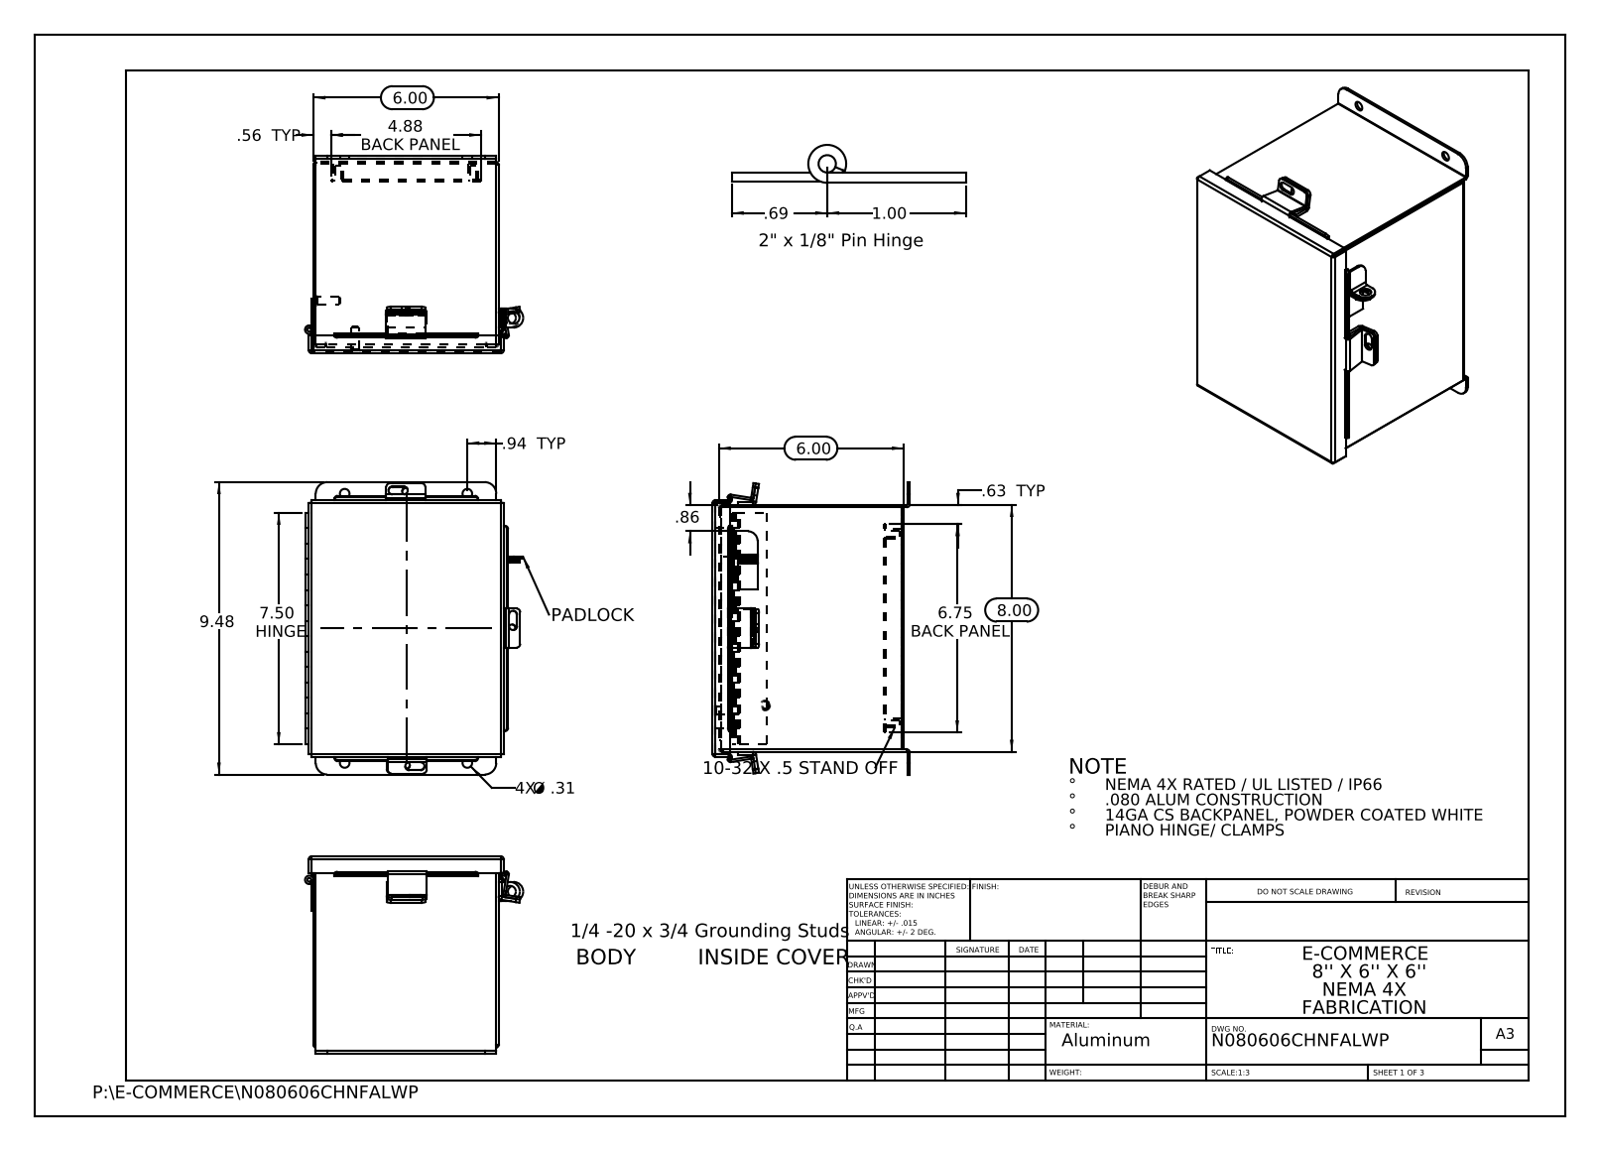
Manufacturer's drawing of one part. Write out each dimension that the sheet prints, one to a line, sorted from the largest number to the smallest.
9.48
8.00
7.50 HINGE
6.75 BACK PANEL
6.00
6.00
4.88 BACK PANEL
1.00
.94 TYP
.86
.69
.63 TYP
.56 TYP
4X Ø .31
